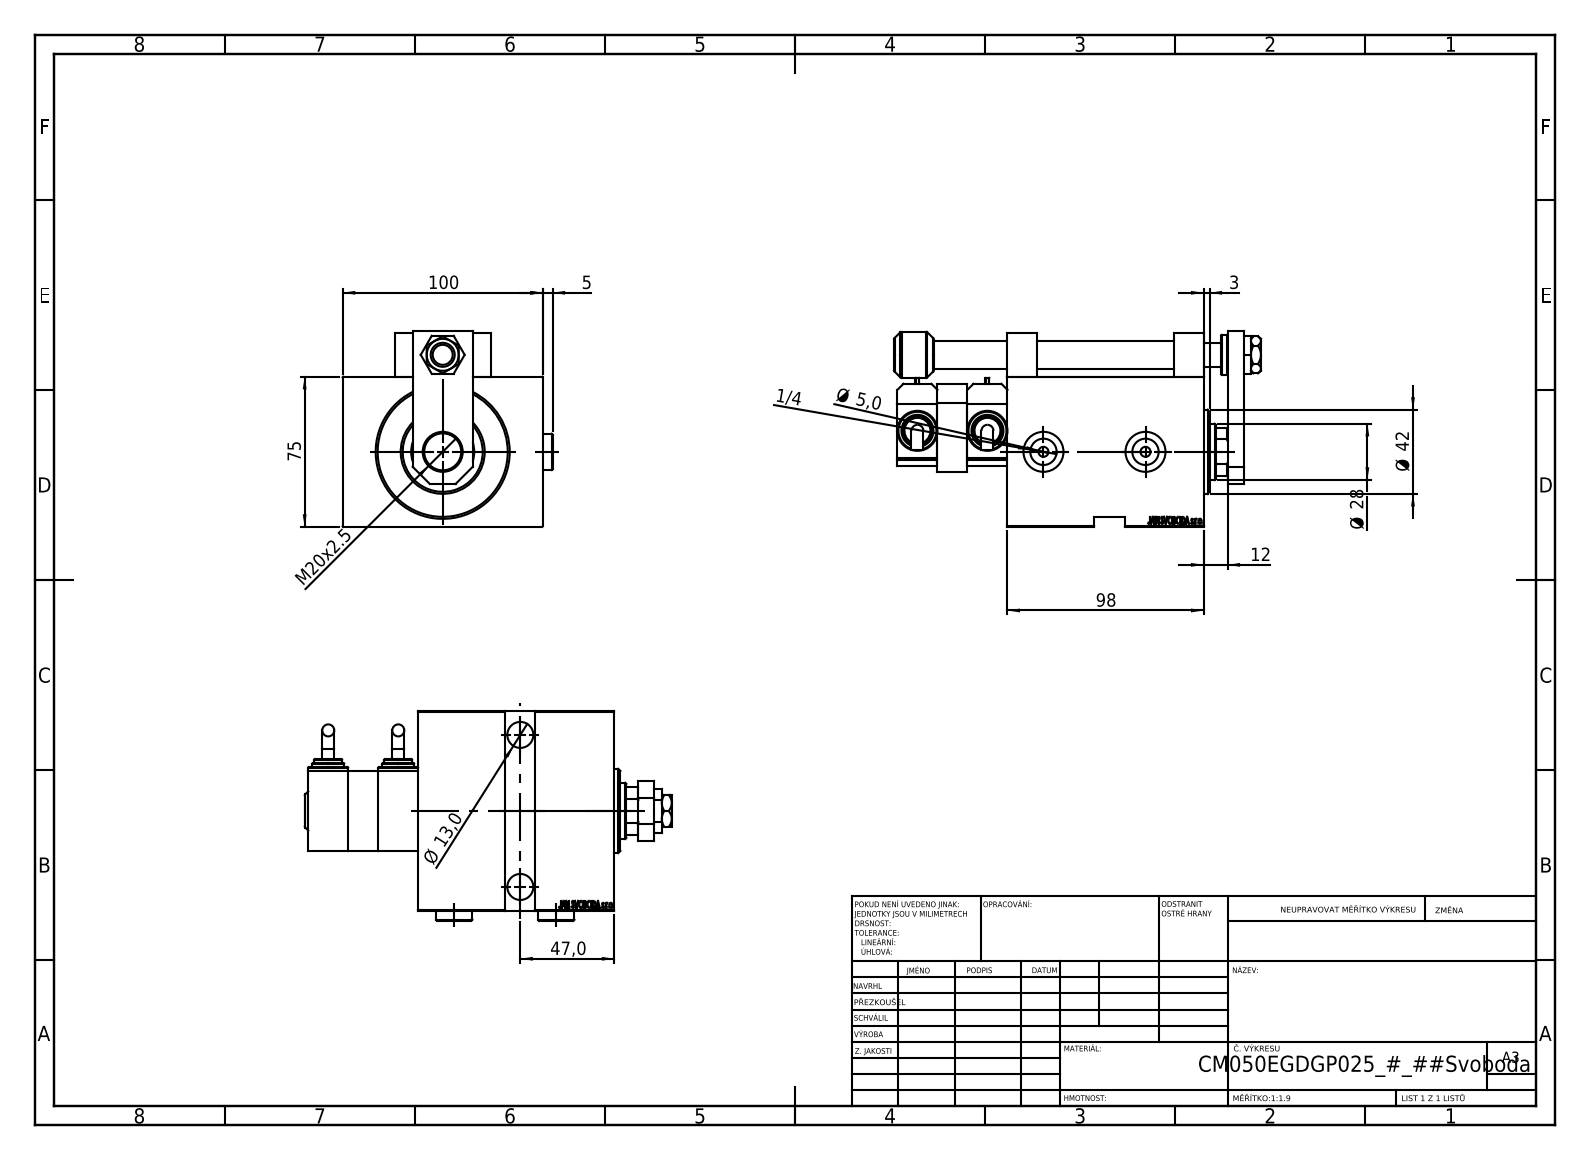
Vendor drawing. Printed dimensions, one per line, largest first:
100
98
75
47,0
Ø 42
Ø 28
M20x2.5
Ø 13,0
12
5
Ø 5,0
3
1/4
